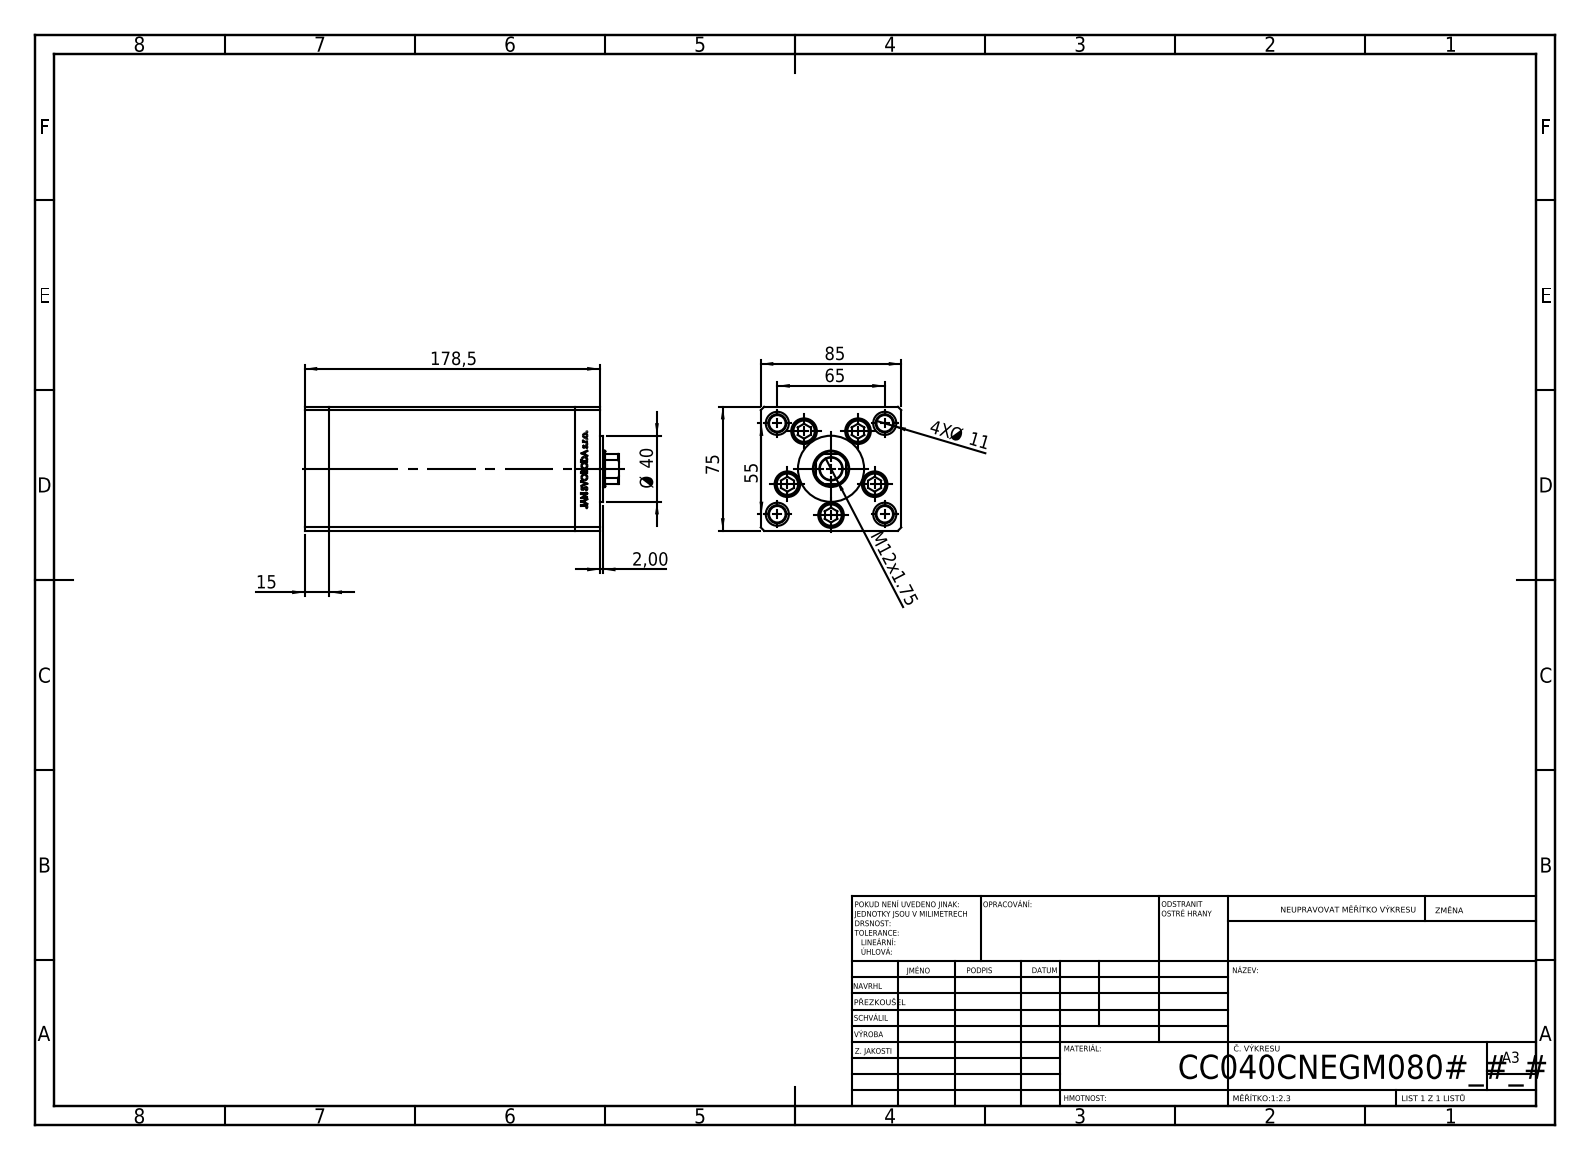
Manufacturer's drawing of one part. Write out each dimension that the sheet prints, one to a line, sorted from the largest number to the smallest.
178,5
85
75
65
55
Ø 40
15
M12x1.75
4X Ø 11
2,00
